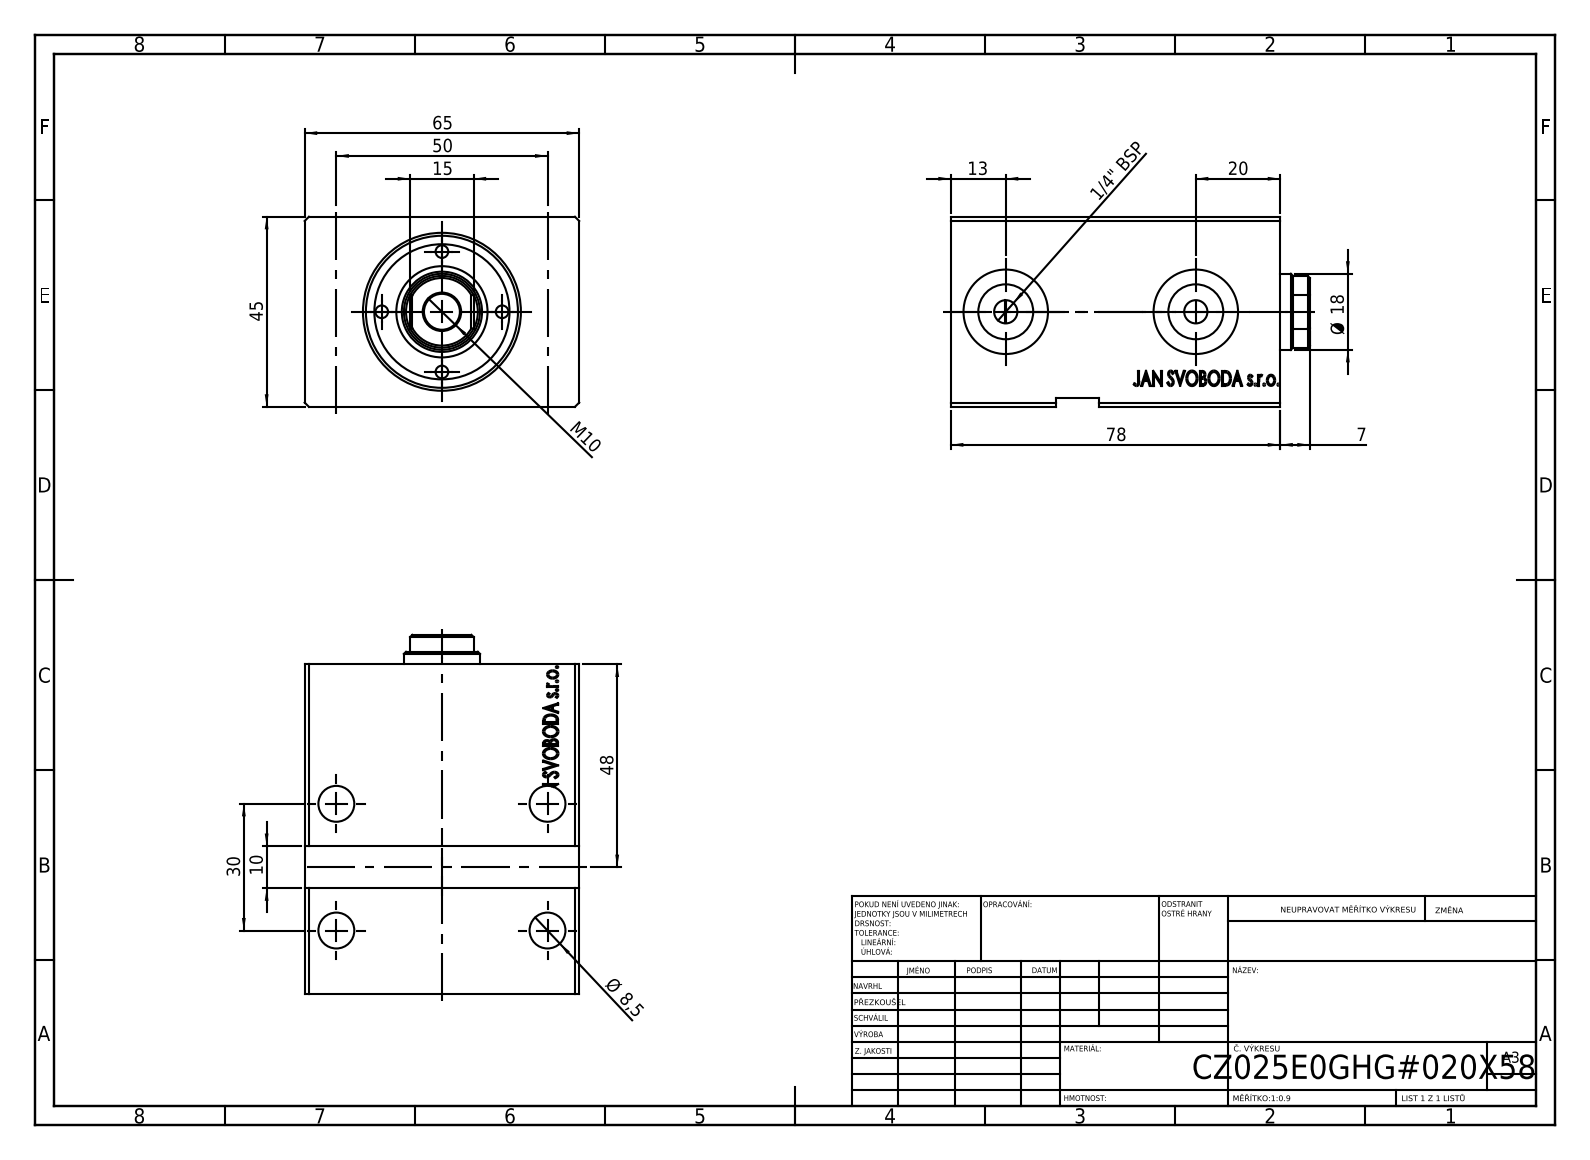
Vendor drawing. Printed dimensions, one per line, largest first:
78
65
50
48
45
30
20
Ø 18
15
13
M10
10
Ø 8,5
7
1/4" BSP
